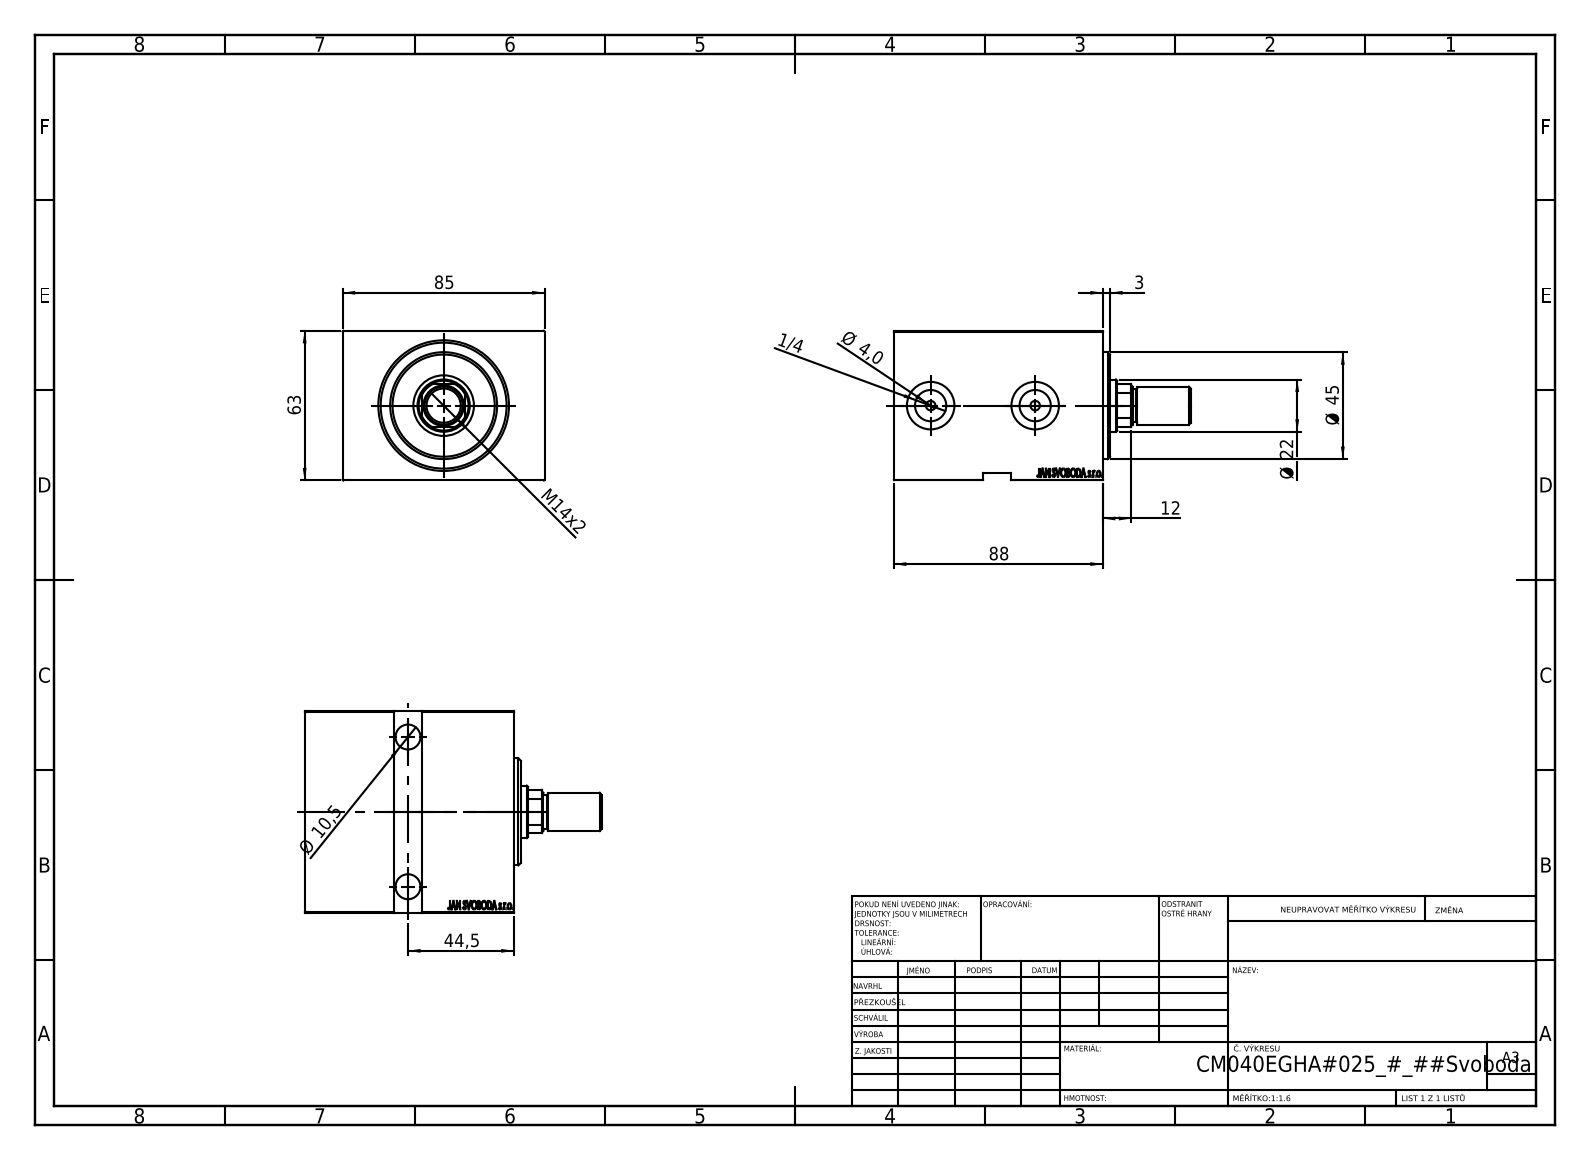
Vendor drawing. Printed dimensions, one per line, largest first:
88
85
63
Ø 45
44,5
Ø 22
M14x2
12
Ø 10,5
Ø 4,0
3
1/4
